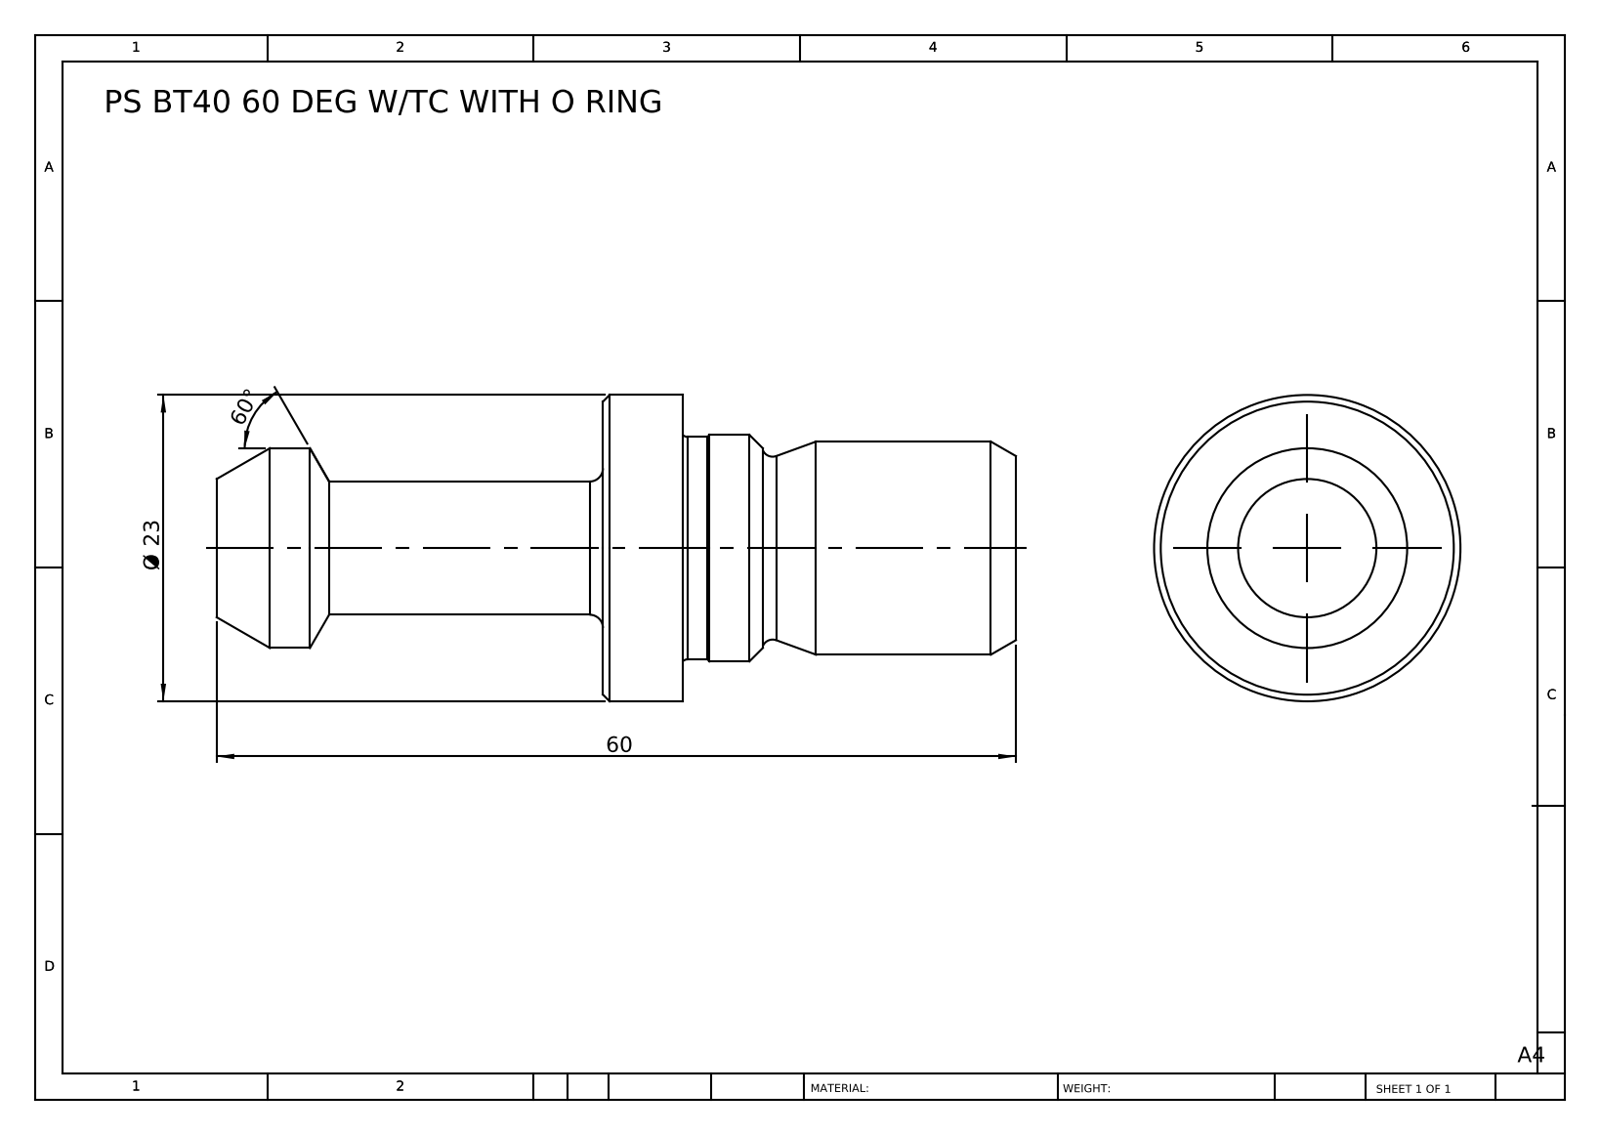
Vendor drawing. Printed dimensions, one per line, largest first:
60°
60
Ø 23
